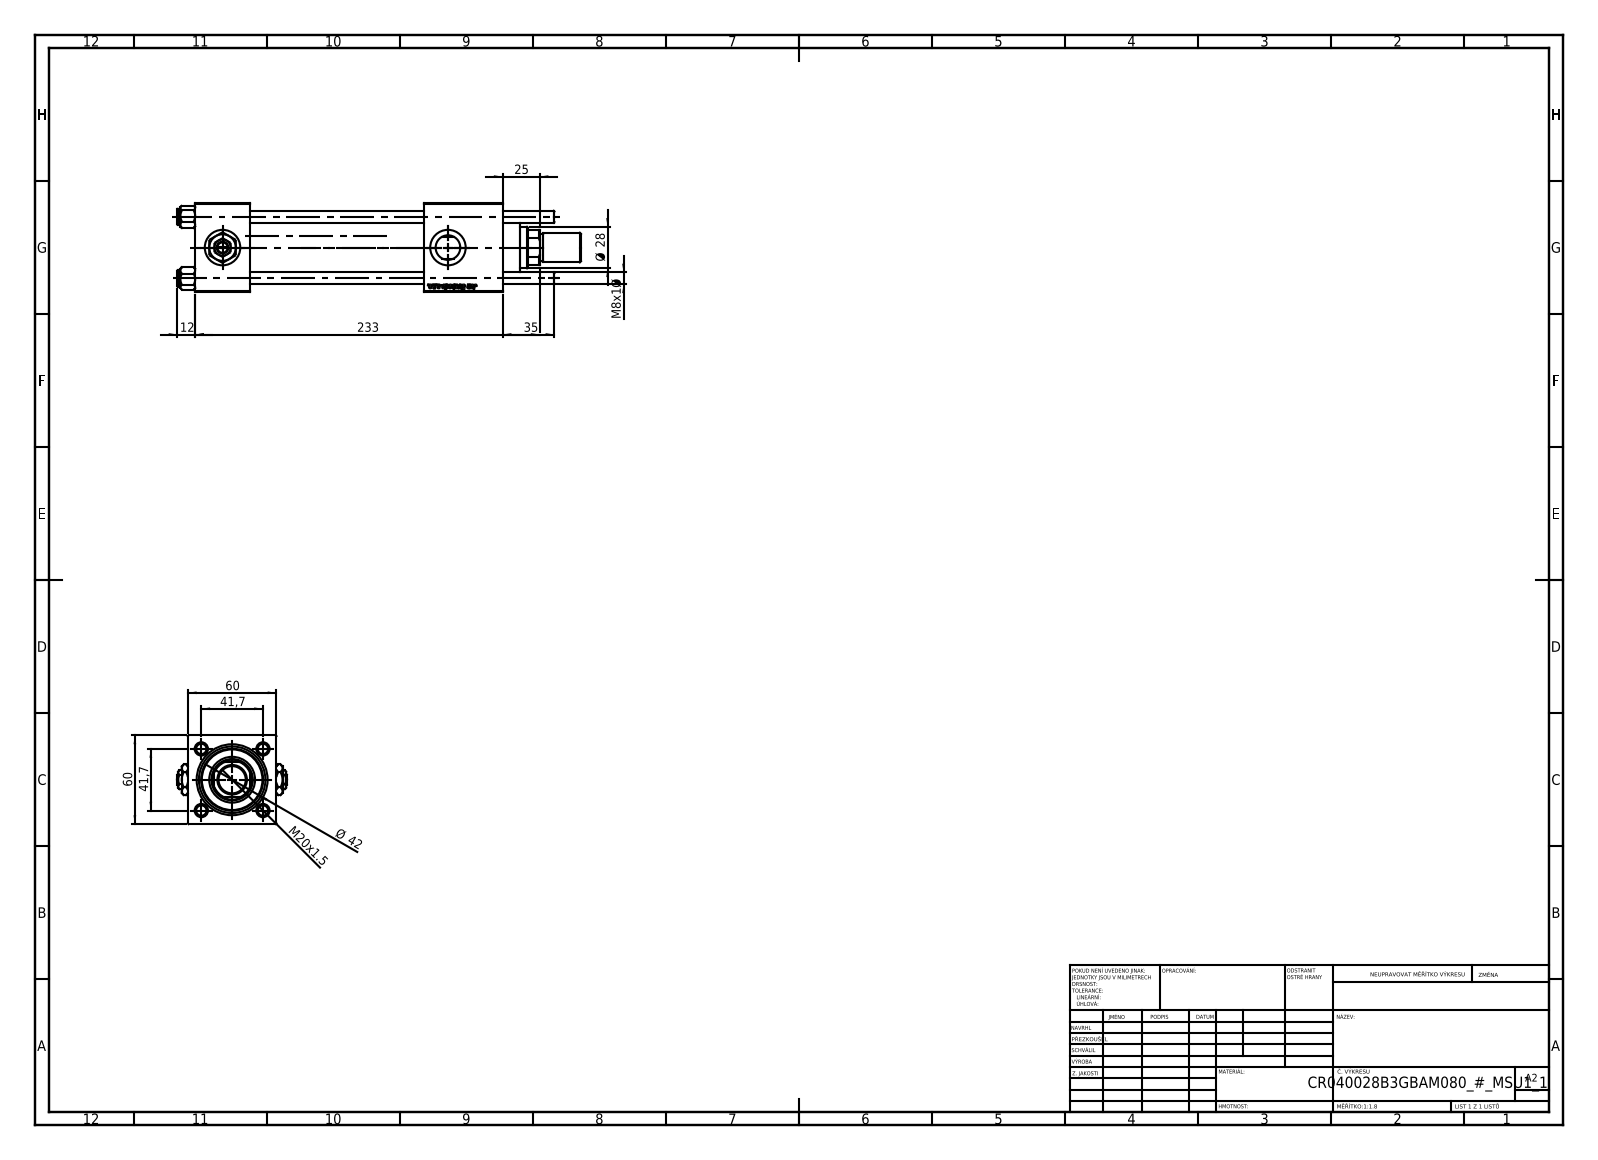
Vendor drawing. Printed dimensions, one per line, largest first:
233
60
60
Ø 42
41,7
41,7
35
Ø 28
25
M20x1.5
12
M8x1 Ø
